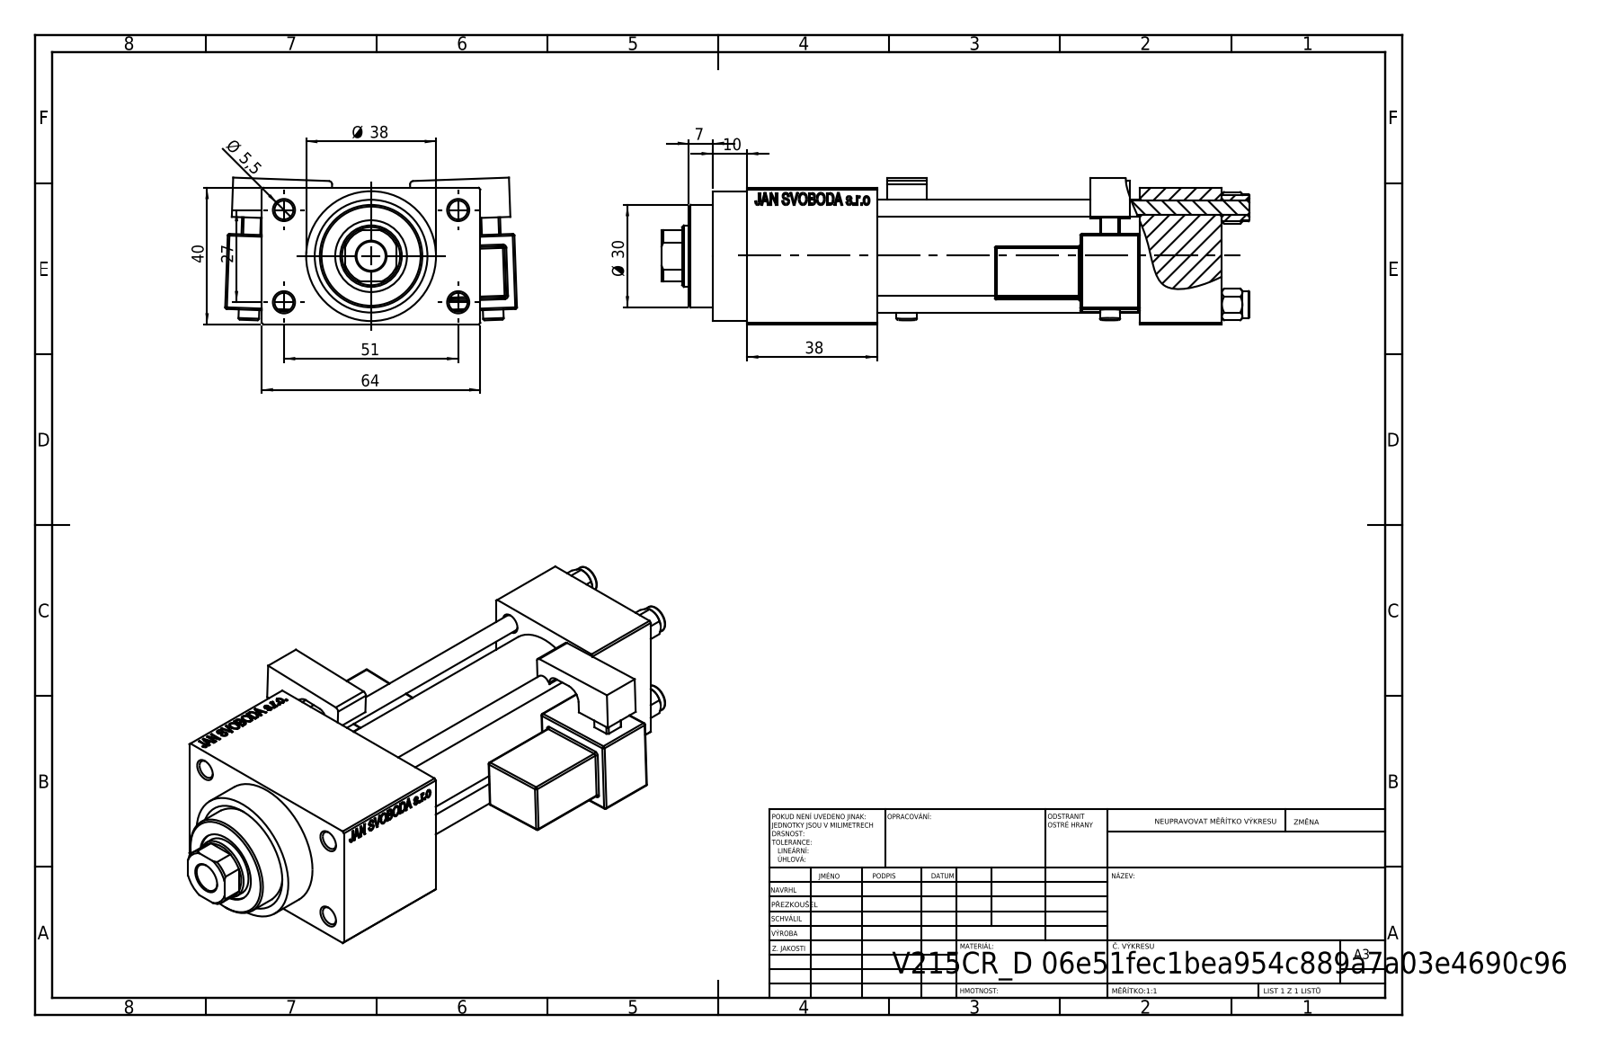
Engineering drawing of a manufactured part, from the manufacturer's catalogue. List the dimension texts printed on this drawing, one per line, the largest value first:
64
51
40
38
Ø 38
Ø 30
27
10
7
Ø 5,5
